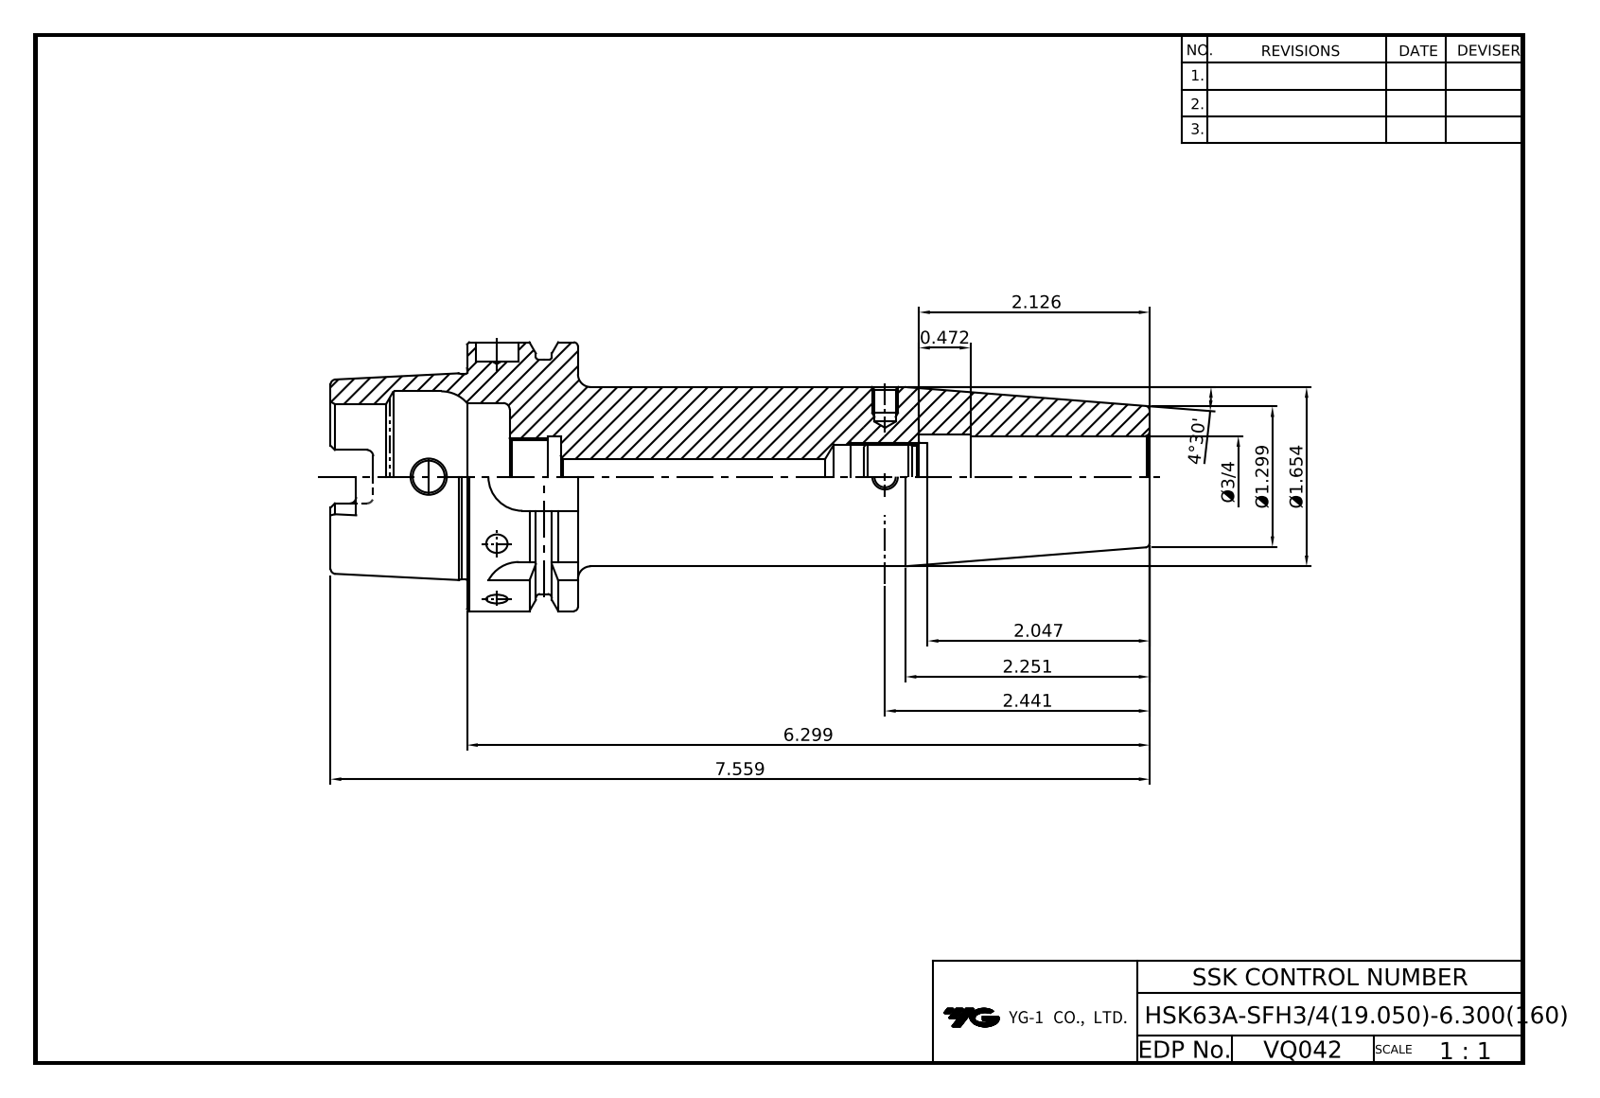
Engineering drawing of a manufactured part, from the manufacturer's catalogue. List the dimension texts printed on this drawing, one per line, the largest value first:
7.559
6.299
4°30'
2.441
2.251
2.126
2.047
Ø1.654
Ø1.299
0.472
